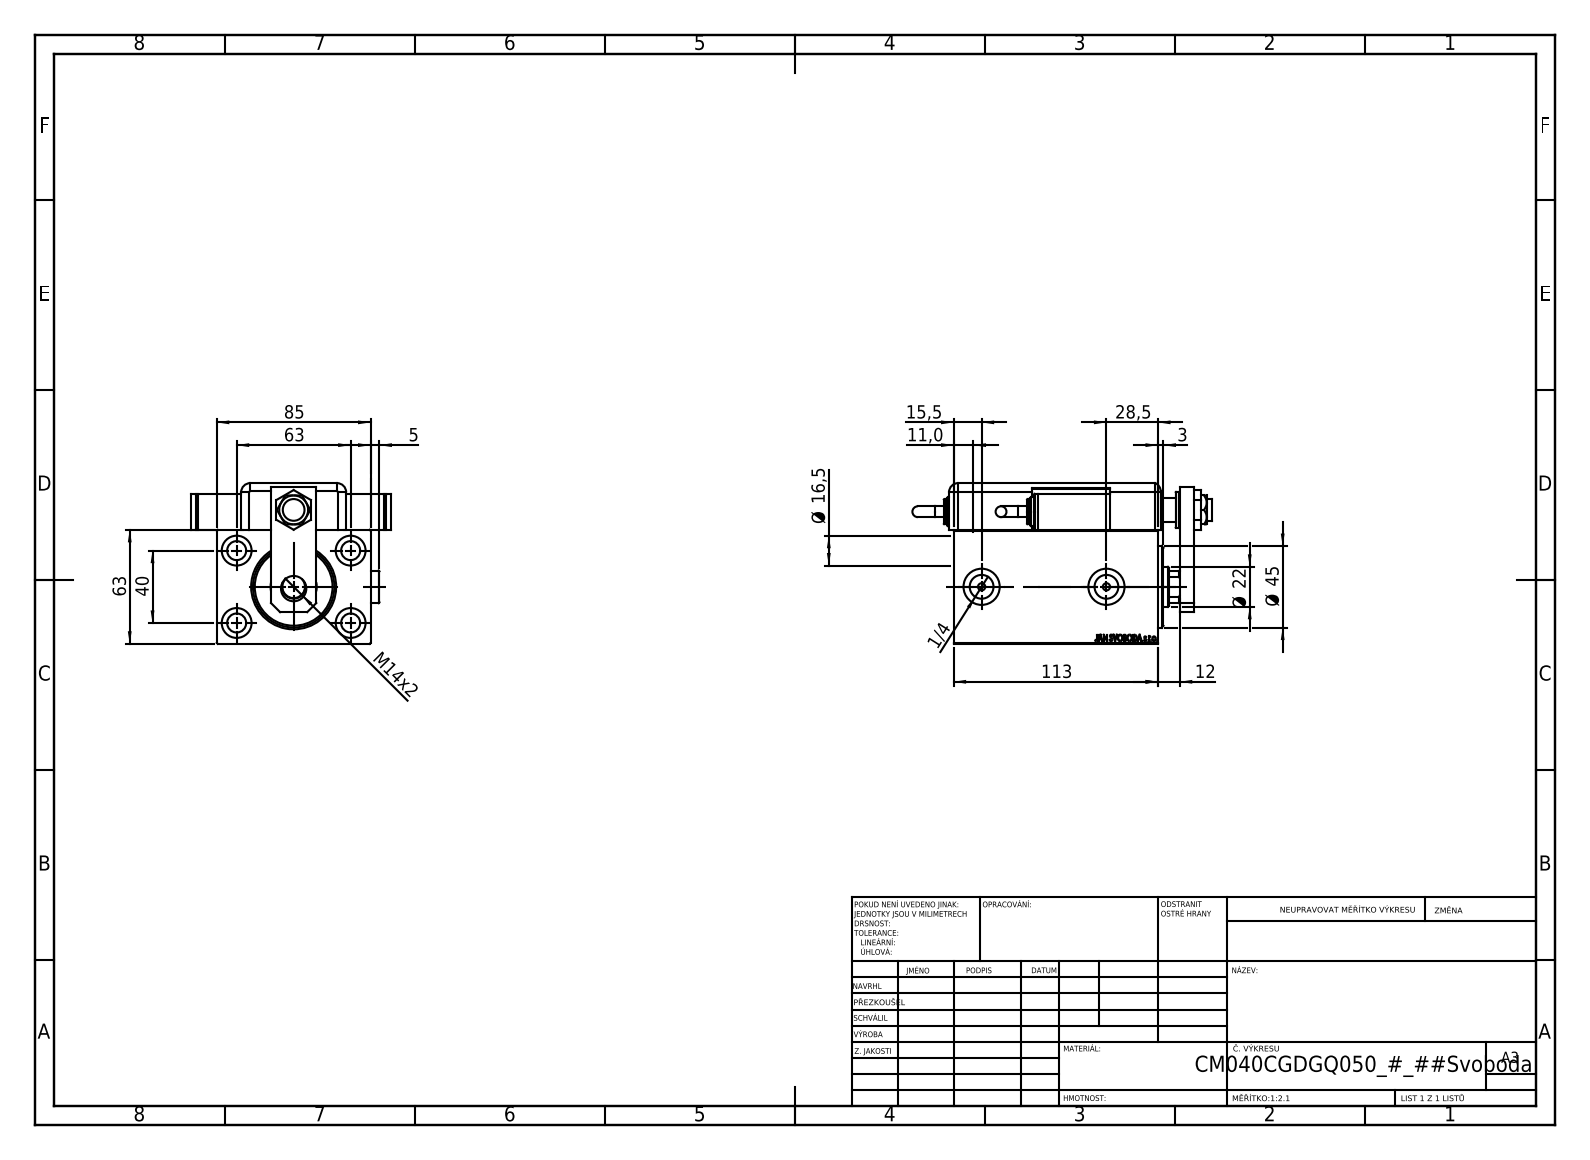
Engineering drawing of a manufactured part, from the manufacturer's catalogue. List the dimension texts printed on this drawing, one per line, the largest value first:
113
85
63
63
Ø 45
40
28,5
Ø 22
Ø 16,5
15,5
M14x2
12
11,0
5
3
1/4
